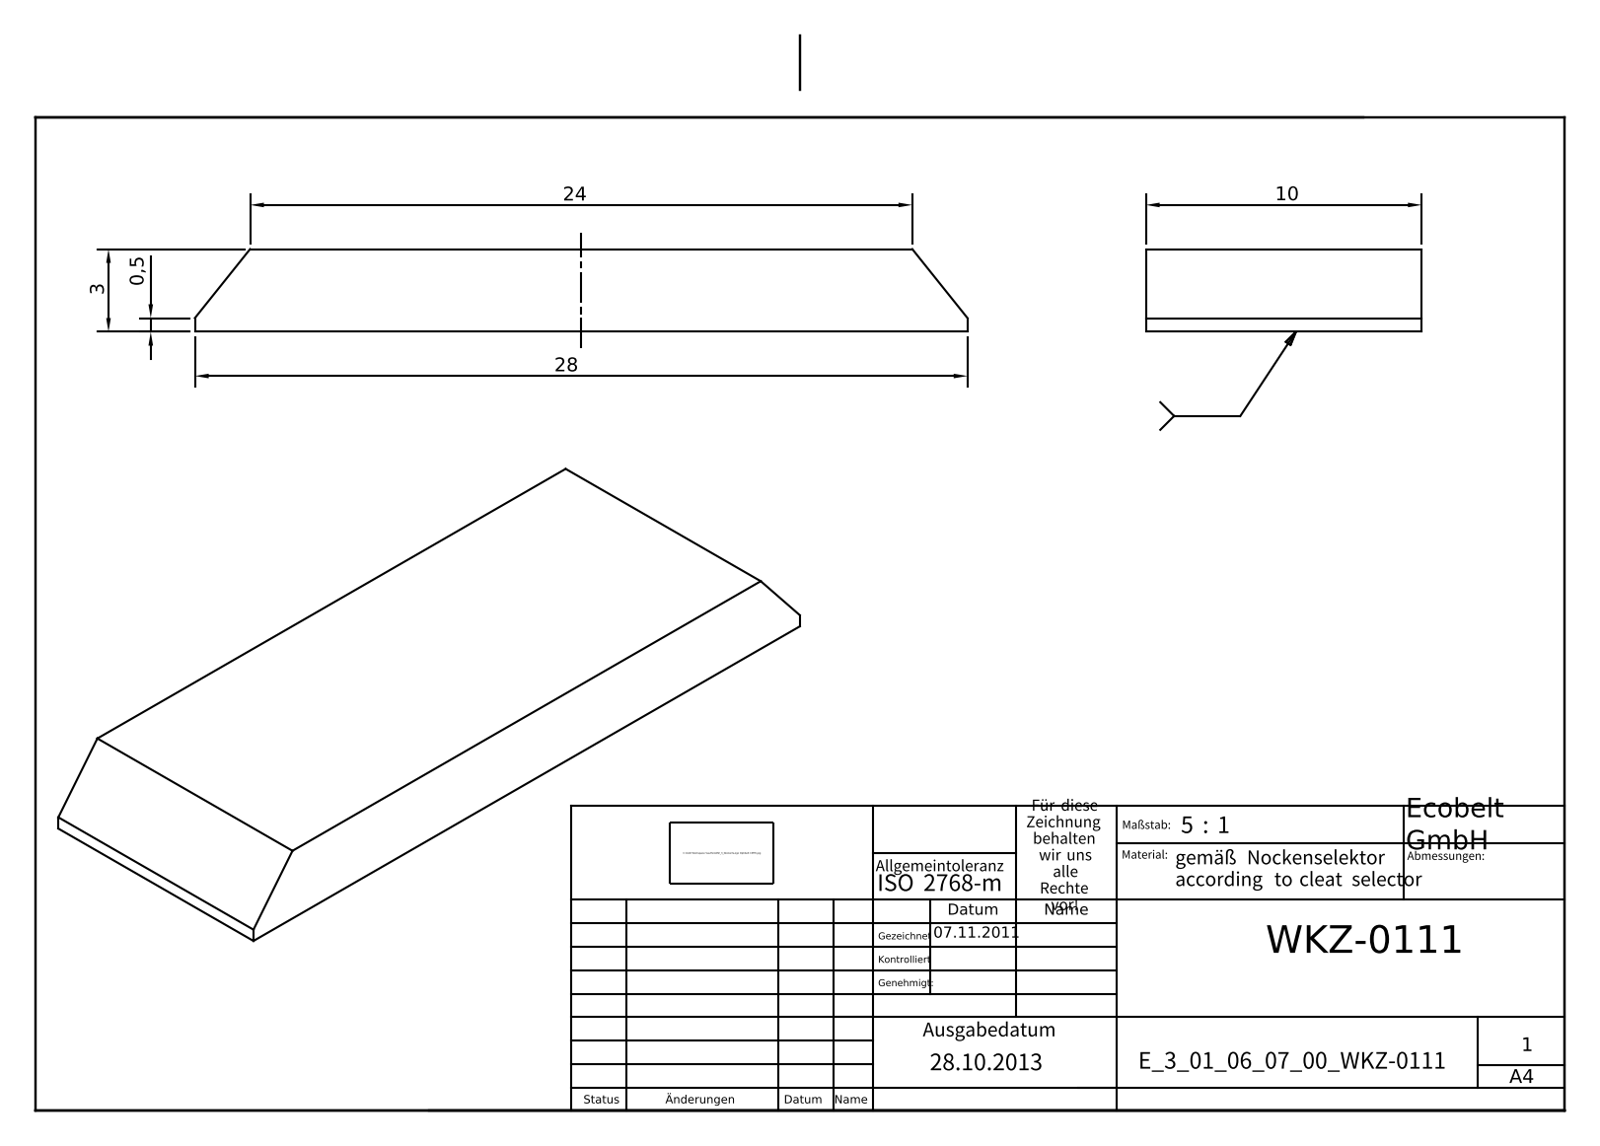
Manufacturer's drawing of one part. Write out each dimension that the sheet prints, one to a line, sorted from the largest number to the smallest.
28
24
10
3
0,5
